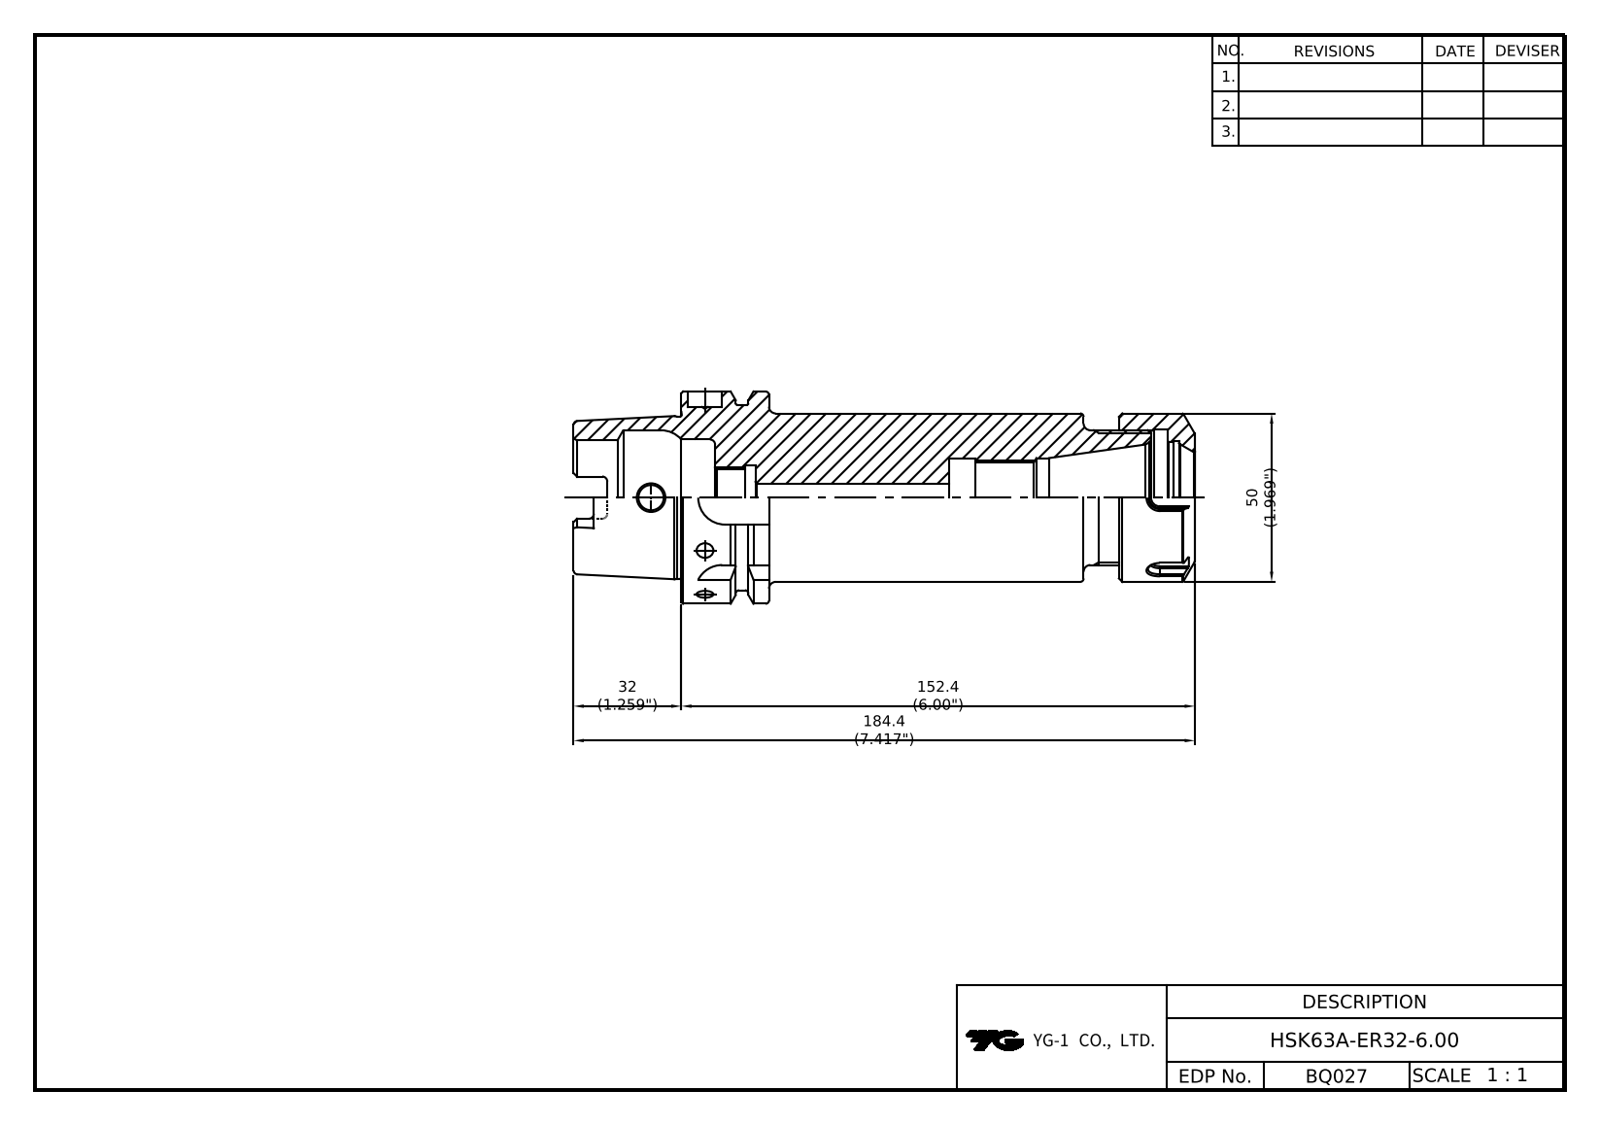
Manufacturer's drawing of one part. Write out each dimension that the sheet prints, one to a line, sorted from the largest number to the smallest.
184.4 (7.417")
152.4 (6.00")
50 (1.969")
32 (1.259")
